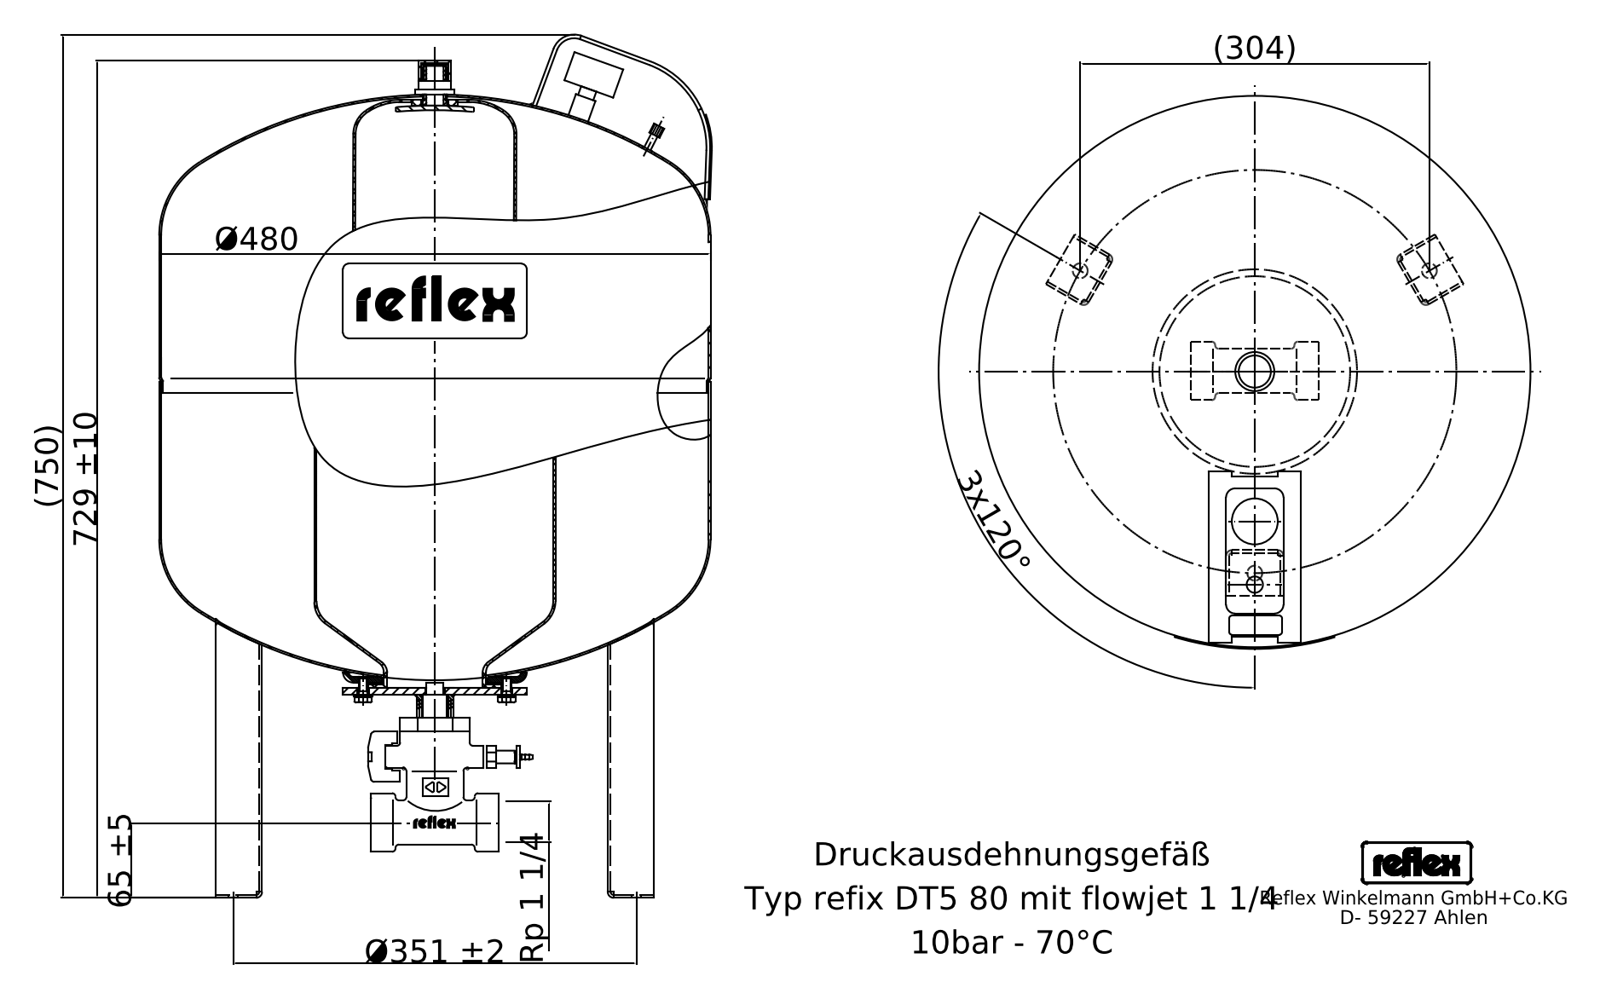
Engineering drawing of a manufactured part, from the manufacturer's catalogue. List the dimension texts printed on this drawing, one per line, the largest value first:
(750)
729 ±10
Ø480
Ø351 ±2
(304)
3x120°
65 ±5
Rp 1 1/4
